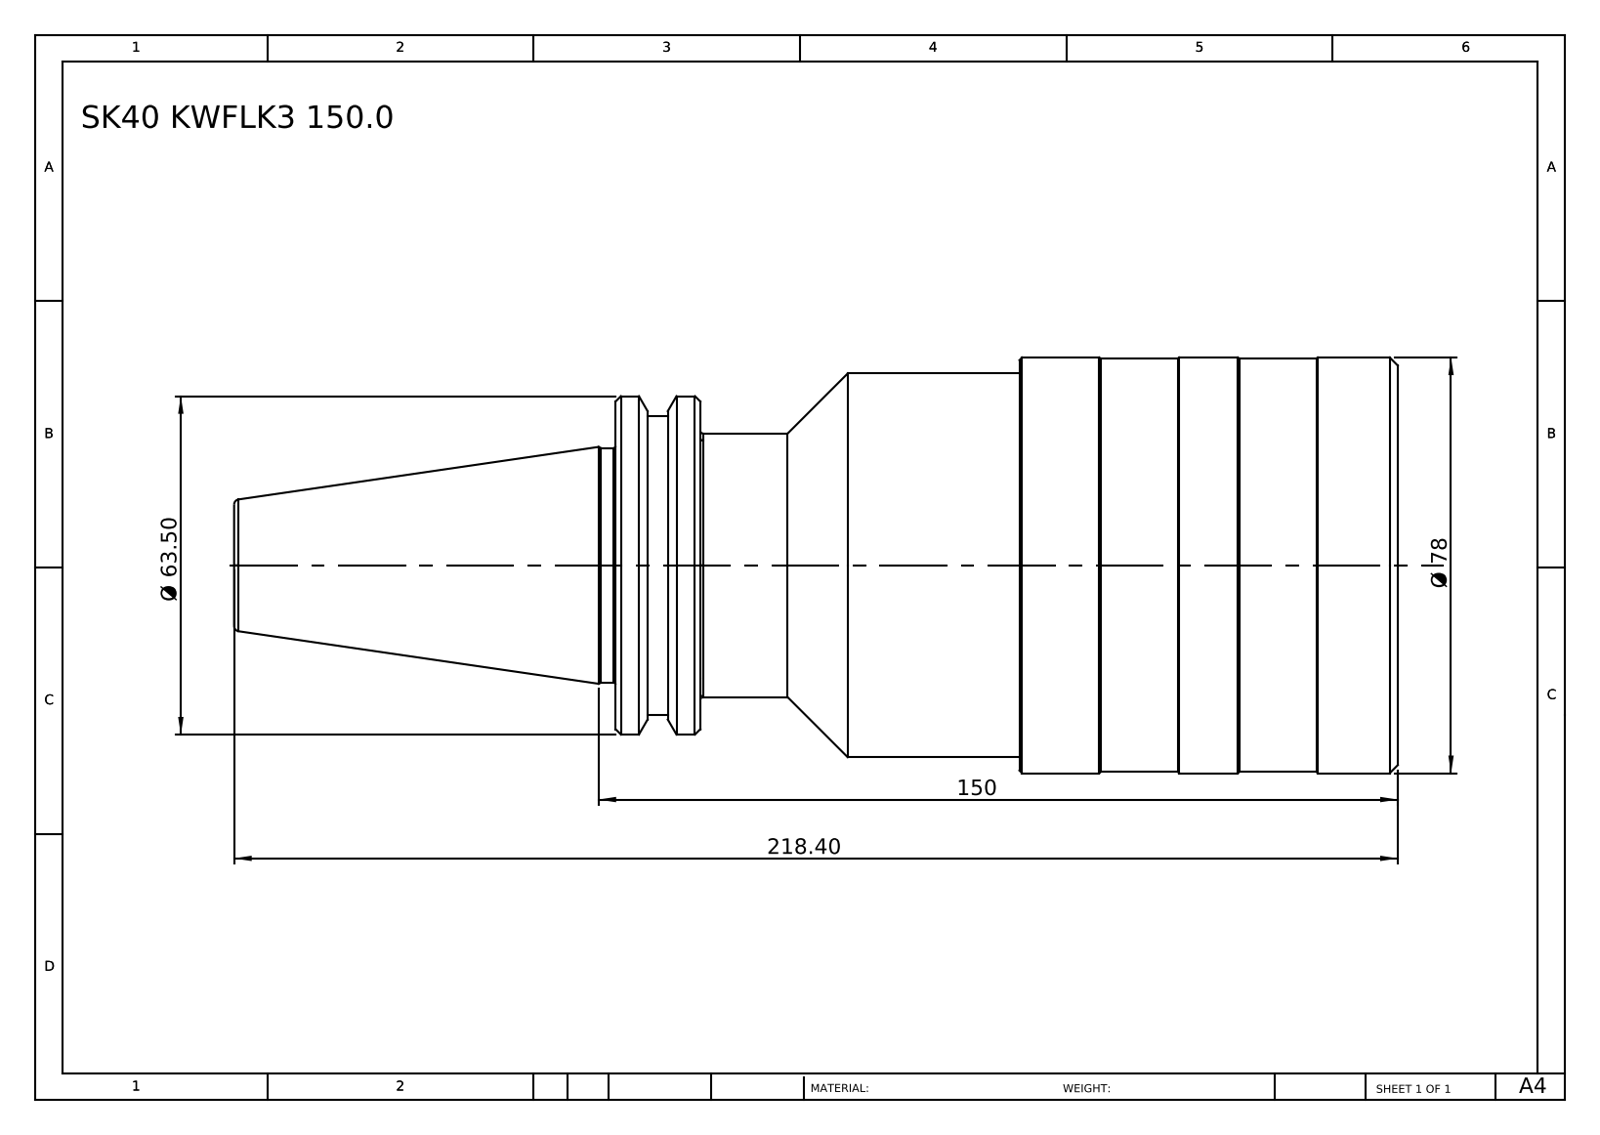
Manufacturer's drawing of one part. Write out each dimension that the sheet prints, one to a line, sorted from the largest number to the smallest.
218.40
150
Ø 78
Ø 63.50
